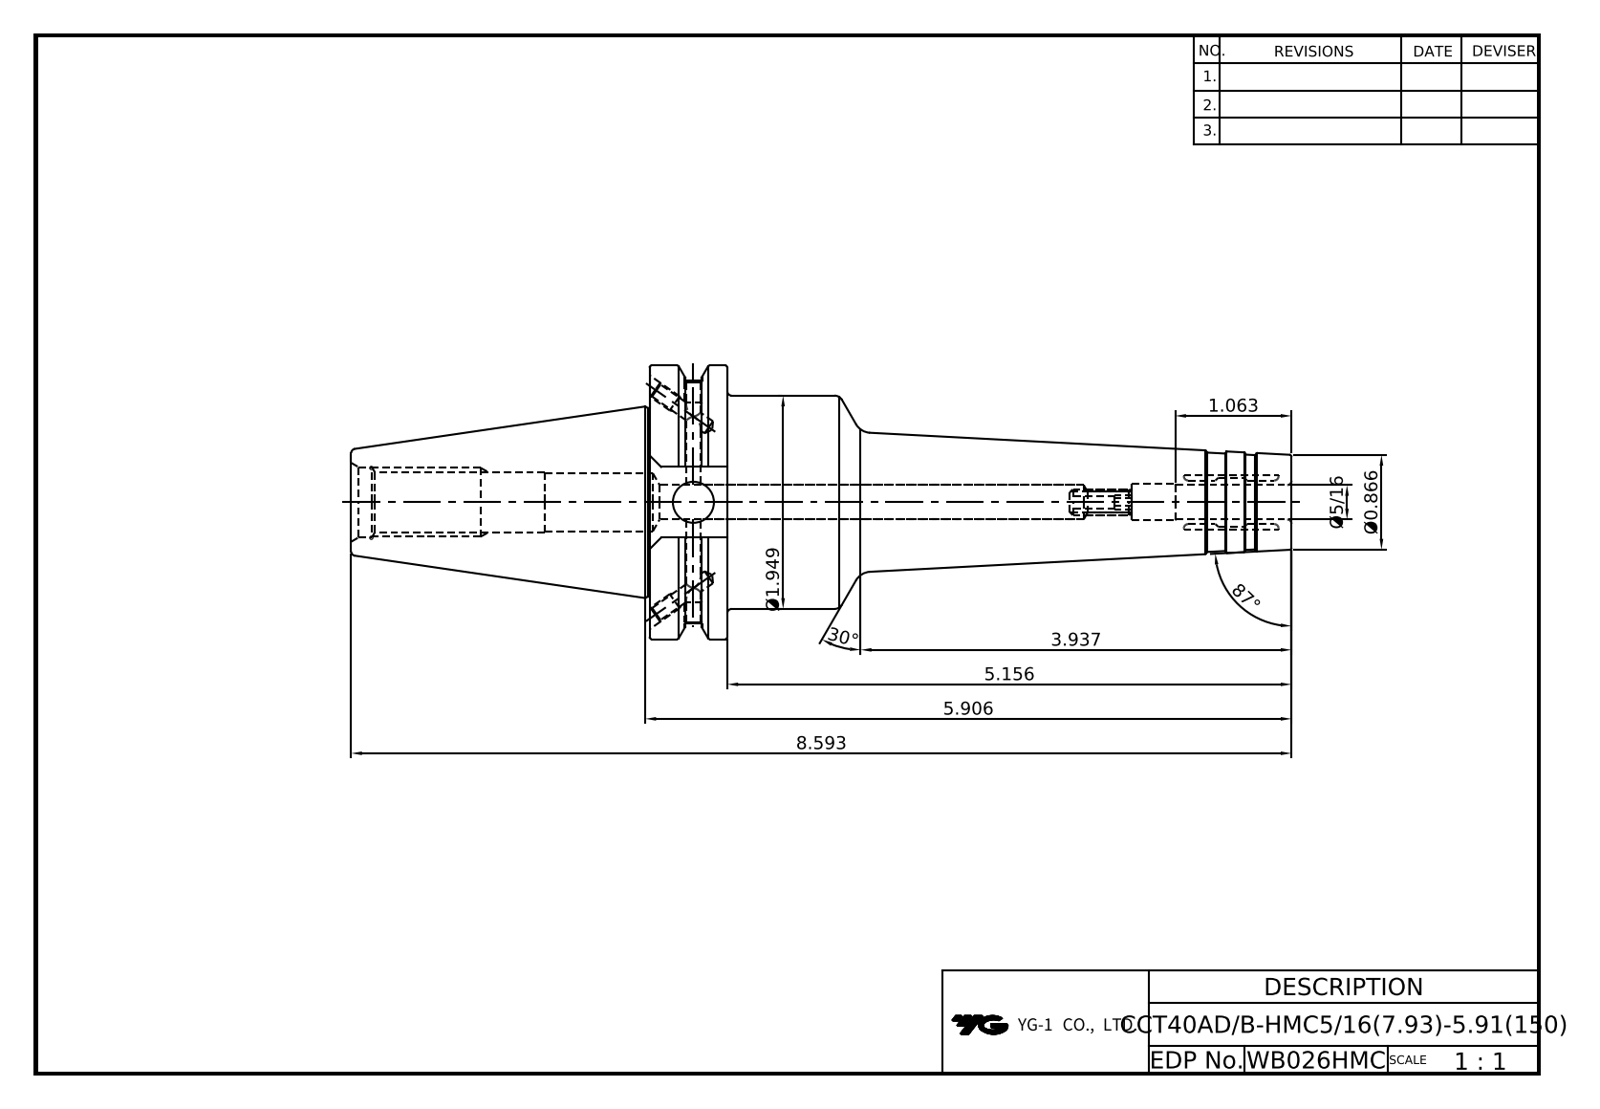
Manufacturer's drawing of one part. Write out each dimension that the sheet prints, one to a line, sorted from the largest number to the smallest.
87°
30°
8.593
5.906
5.156
3.937
Ø1.949
1.063
Ø0.866
Ø5/16
